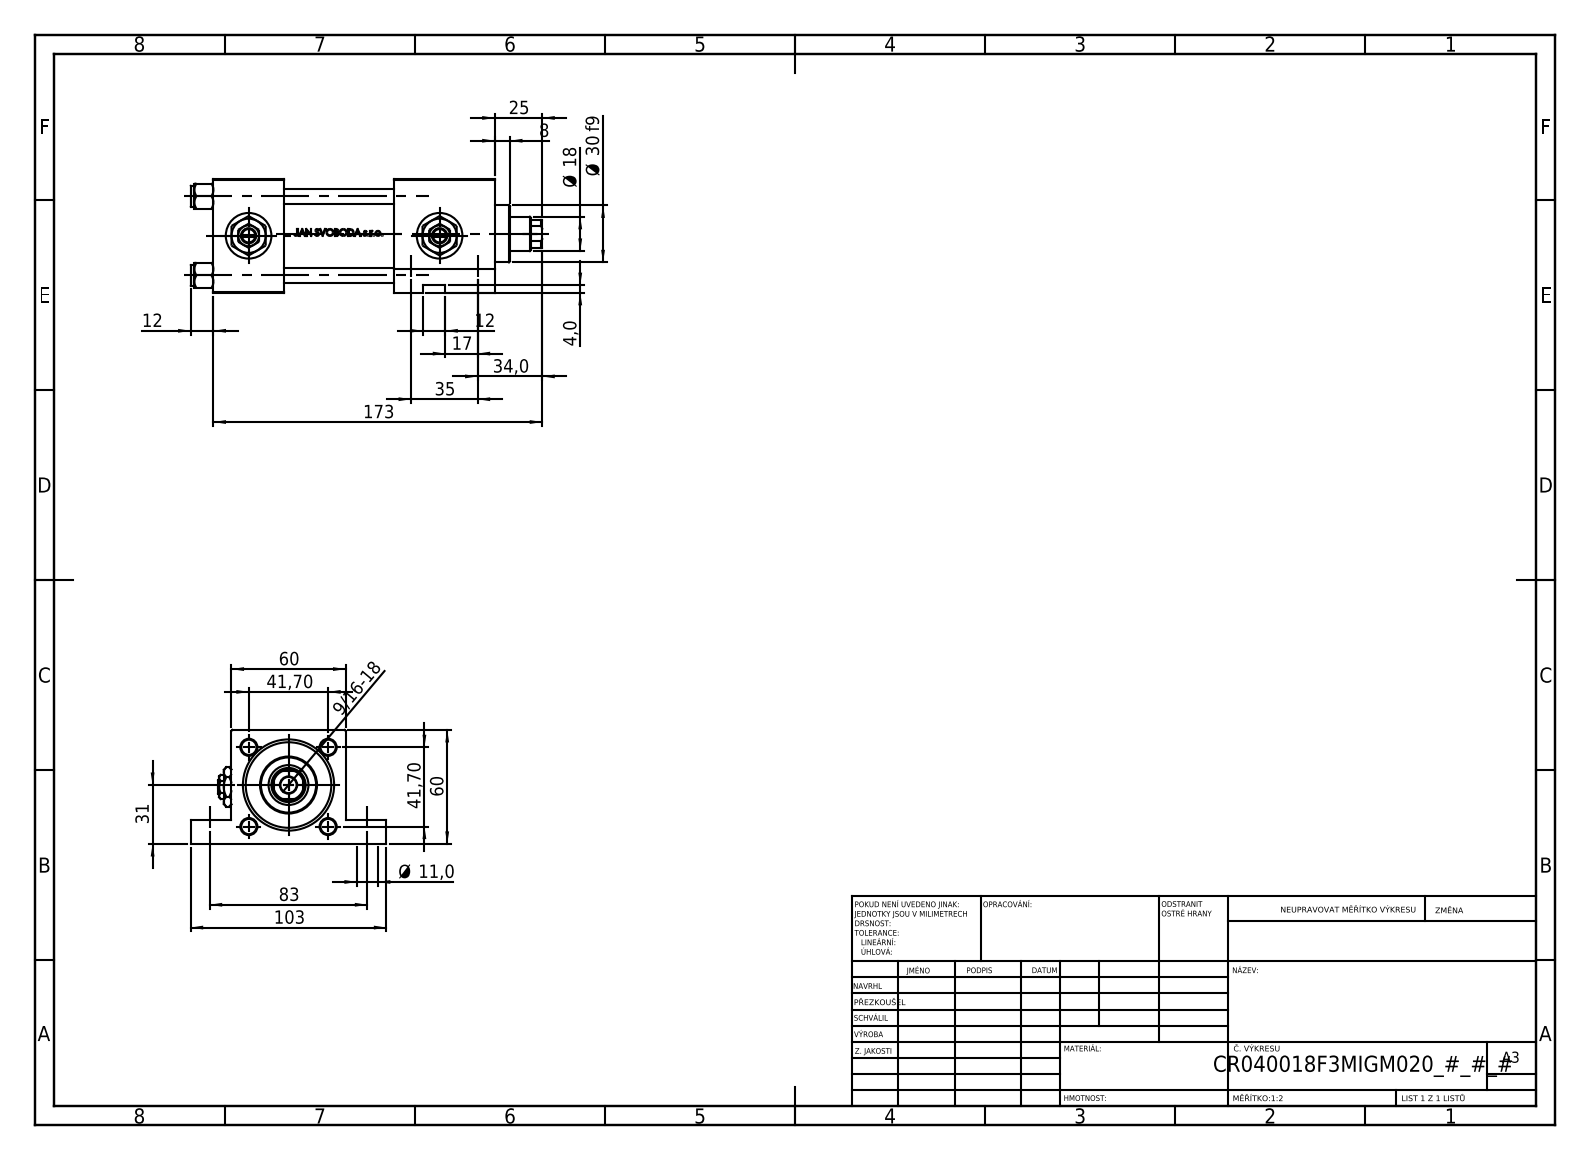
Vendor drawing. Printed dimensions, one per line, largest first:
173
103
83
60
60
41,70
41,70
35
34,0
31
Ø 30 f9
25
Ø 18
17
12
12
Ø 11,0
8
4,0
9/16-18
